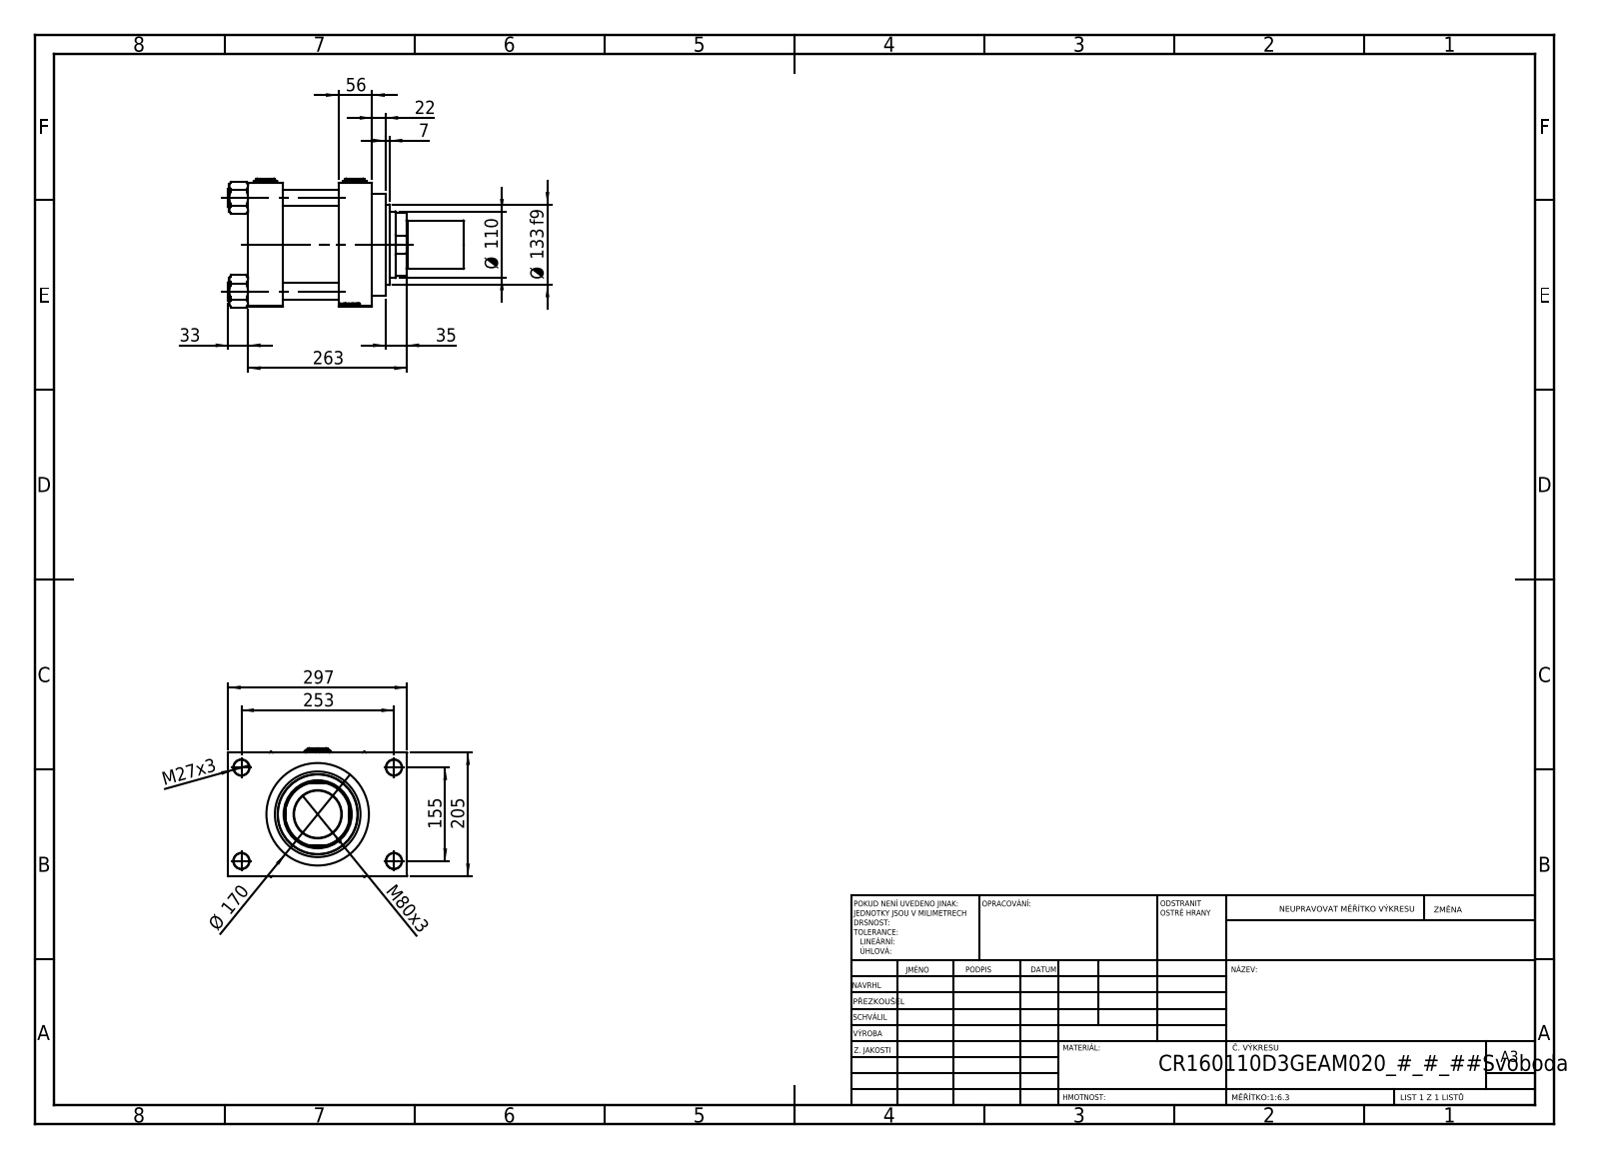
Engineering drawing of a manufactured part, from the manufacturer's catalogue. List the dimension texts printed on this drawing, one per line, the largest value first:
297
263
253
205
Ø 170
155
Ø 133 f9
Ø 110
M80x3
56
35
33
M27x3
22
7
